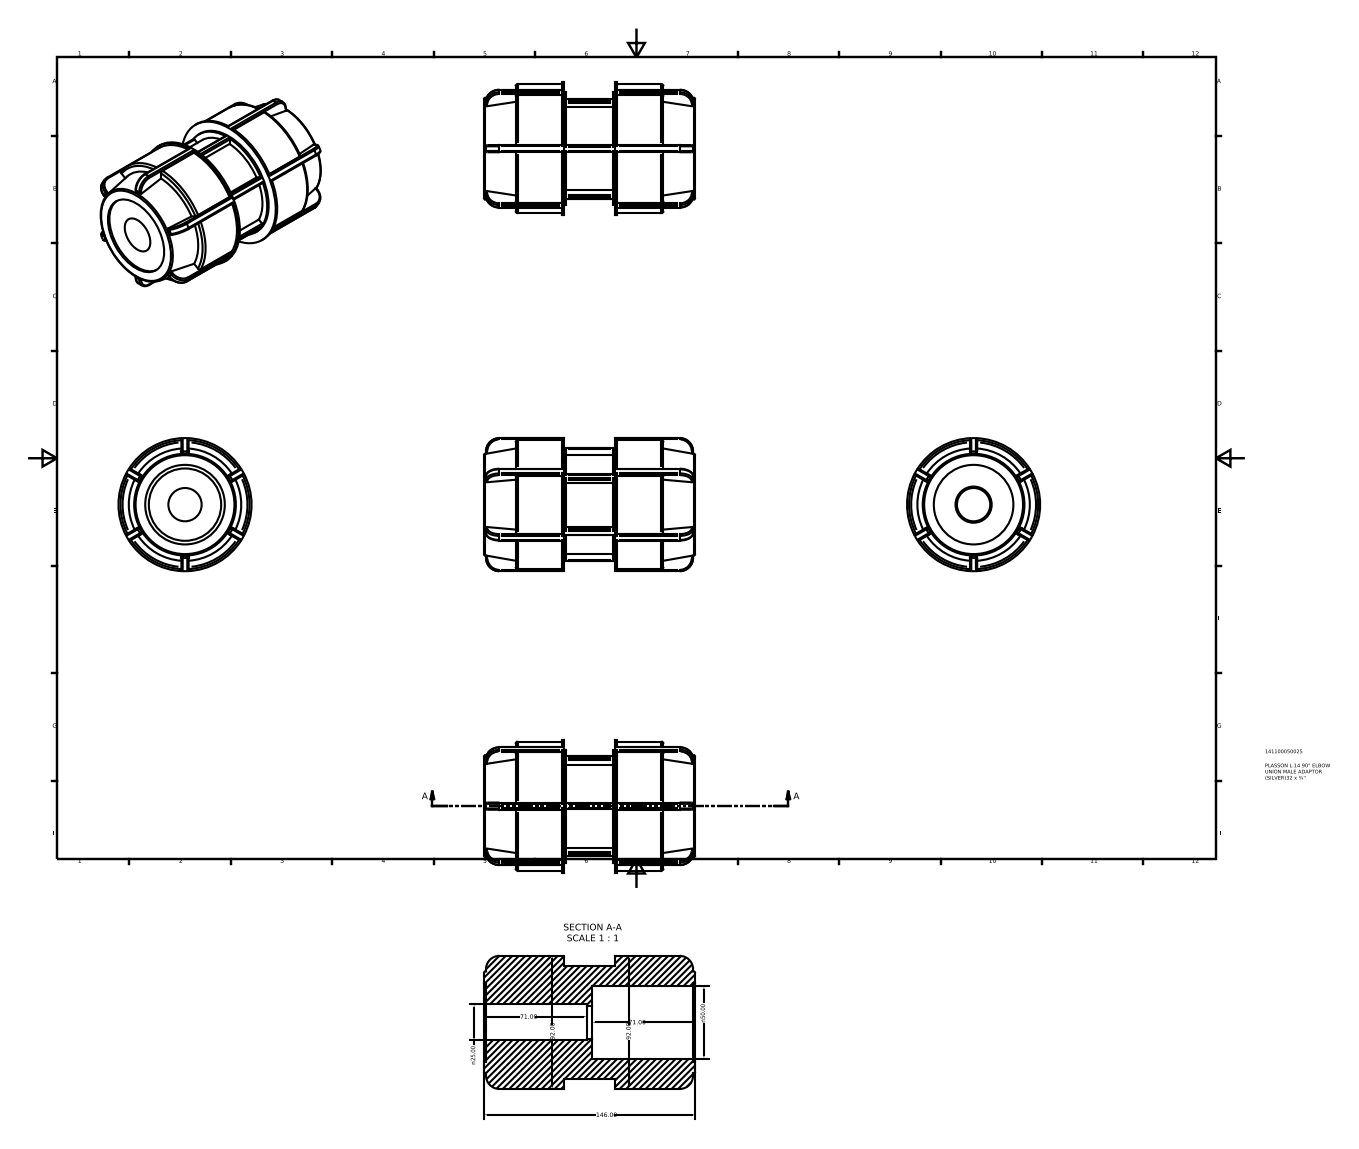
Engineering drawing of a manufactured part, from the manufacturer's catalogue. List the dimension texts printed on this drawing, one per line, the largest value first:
146.00
92.00
92.00
71.00
71.00
n50.00
n25.00
